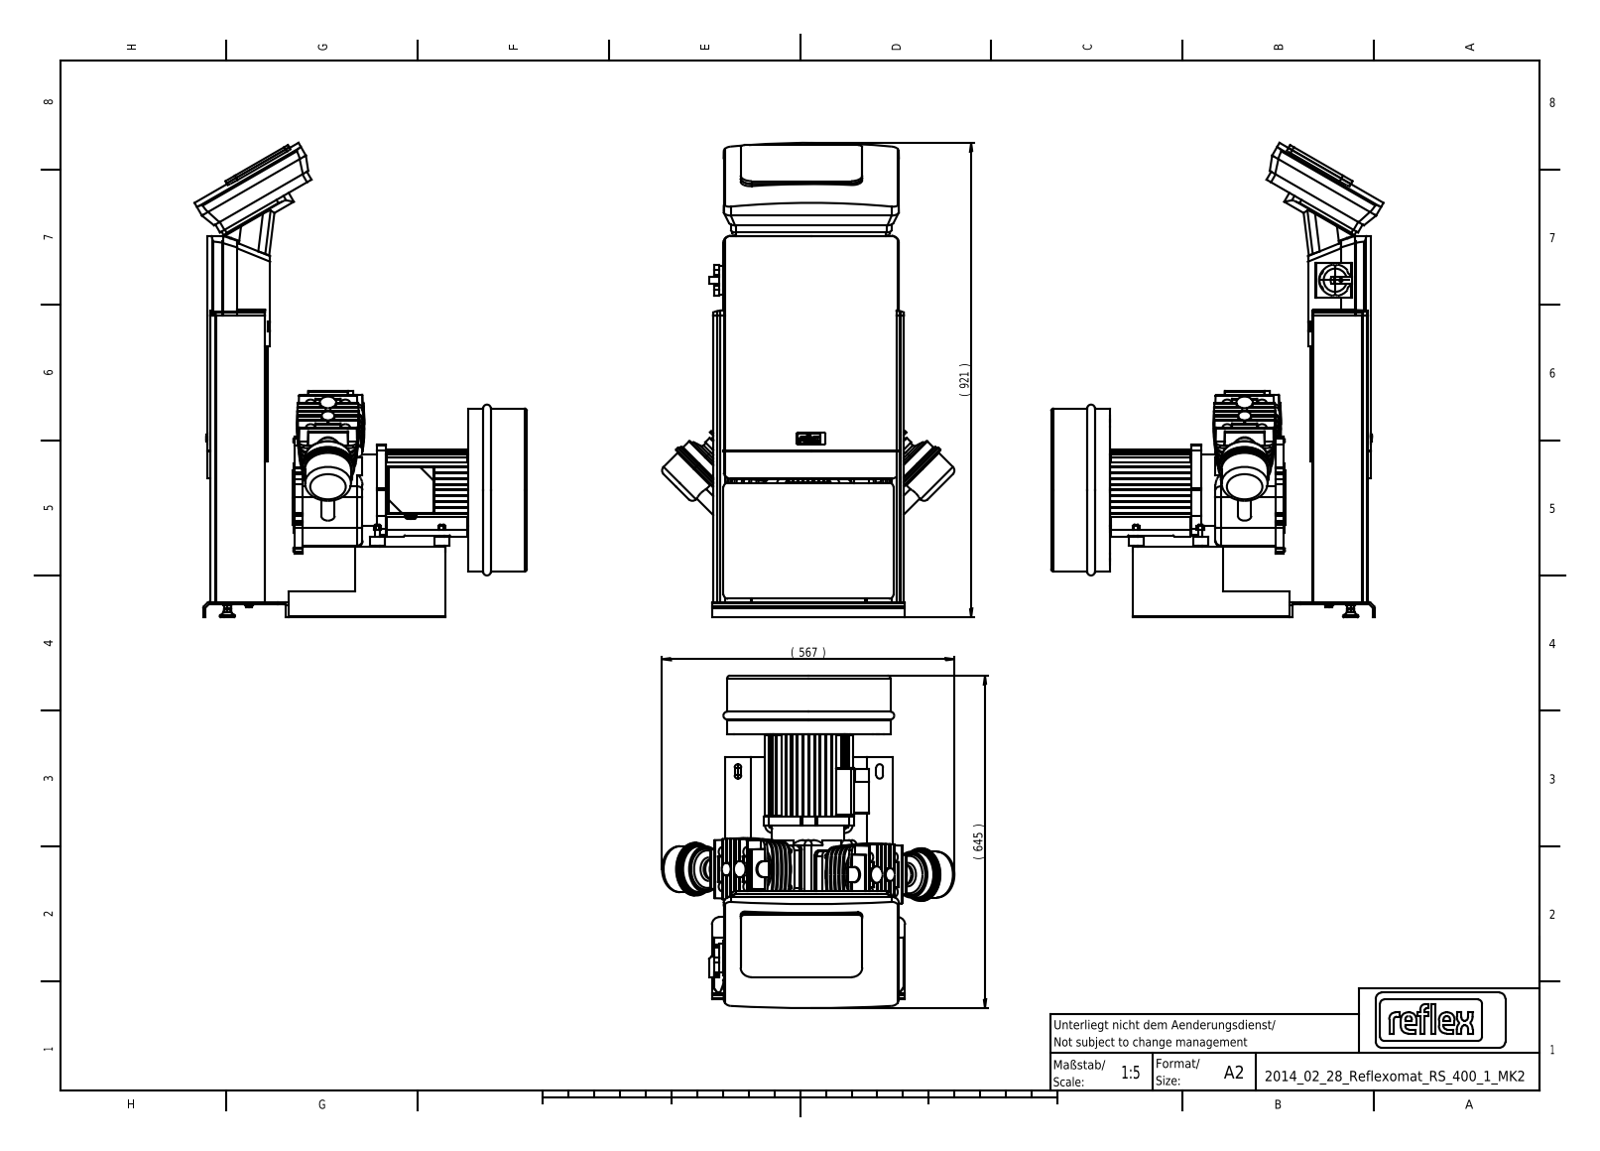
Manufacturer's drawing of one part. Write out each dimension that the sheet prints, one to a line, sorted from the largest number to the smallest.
921 ( )
645 ( )
567 ( )
